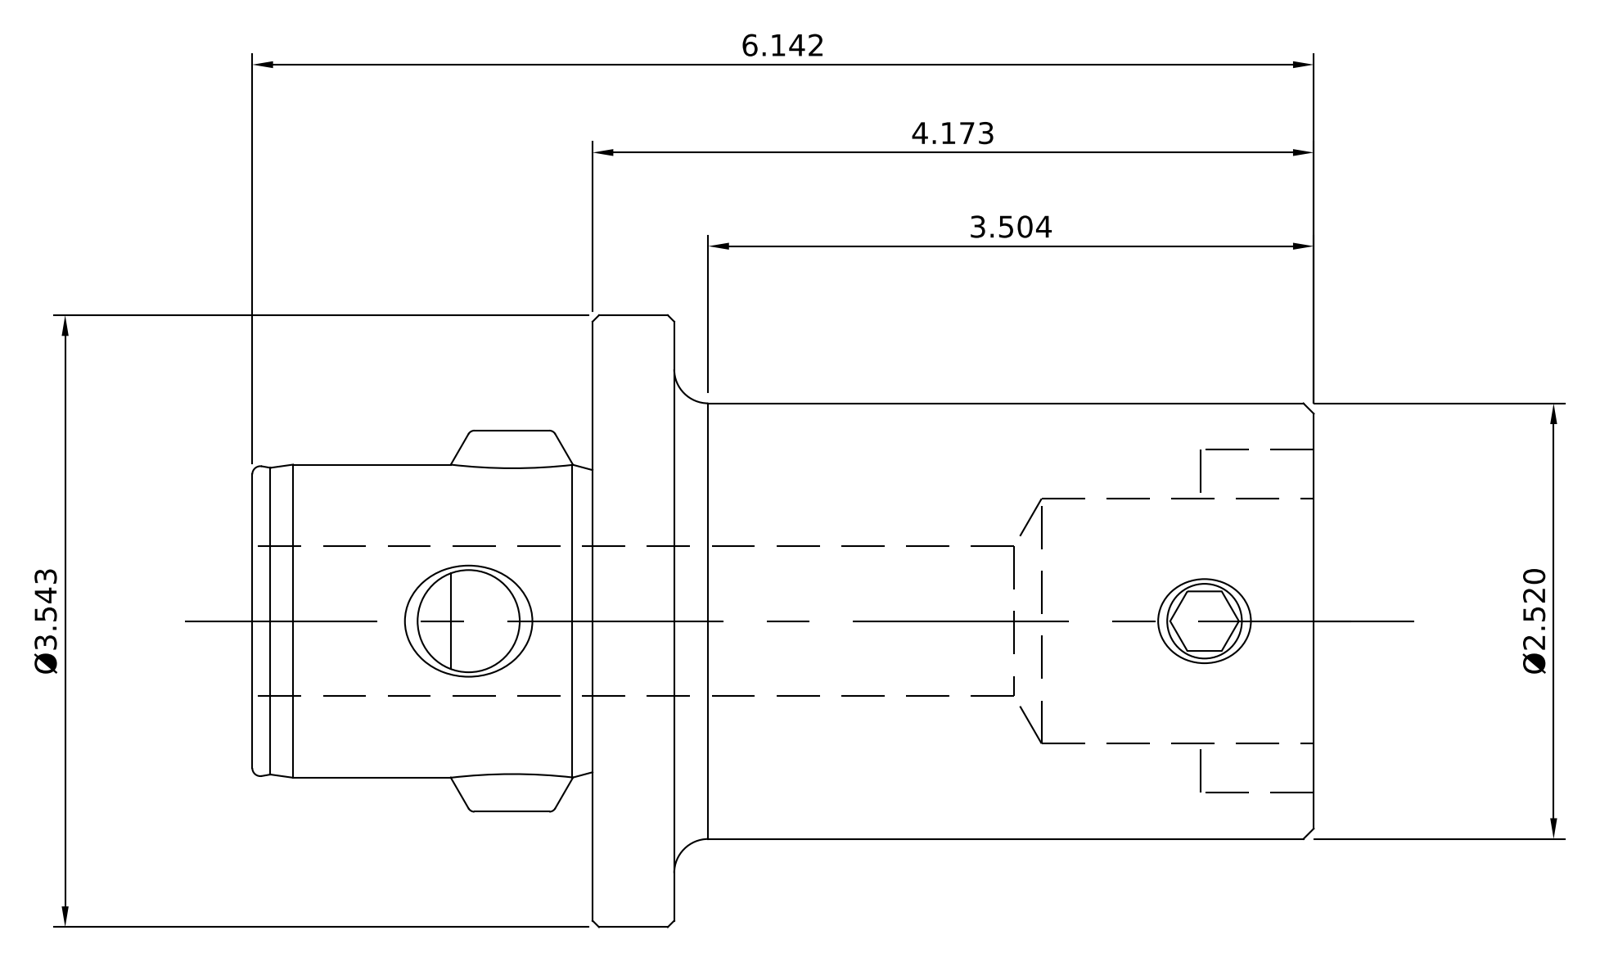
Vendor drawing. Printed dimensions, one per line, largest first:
6.142
4.173
Ø3.543
3.504
Ø2.520
